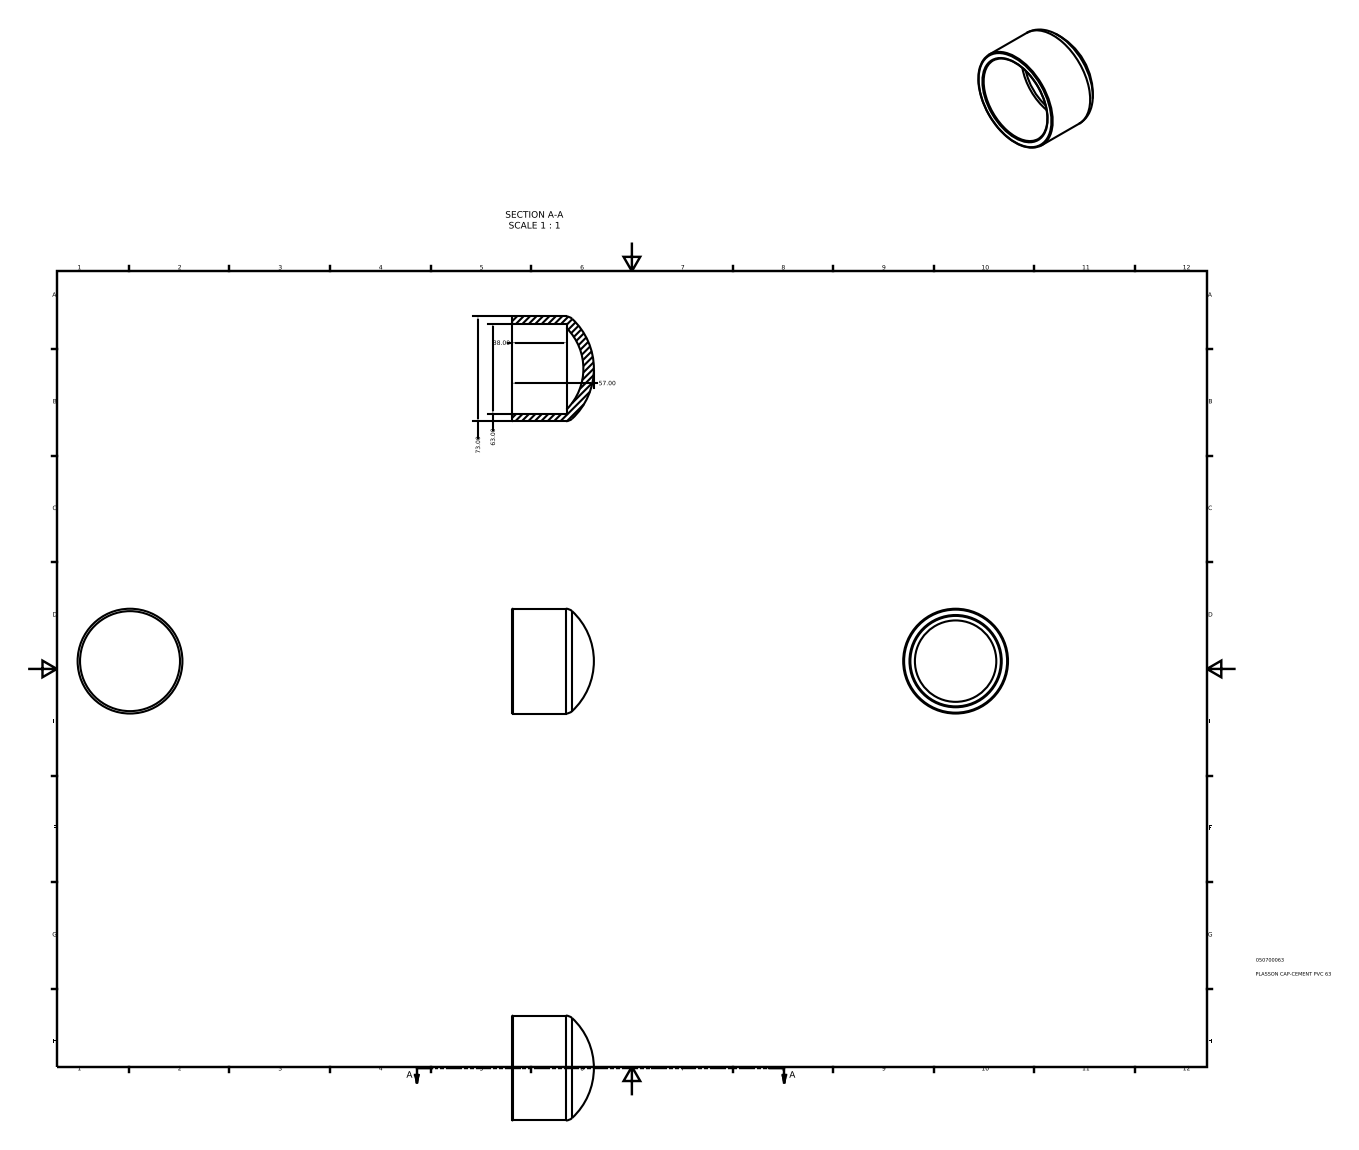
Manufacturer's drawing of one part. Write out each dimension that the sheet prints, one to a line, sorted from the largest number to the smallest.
73.00
63.00
57.00
38.00
